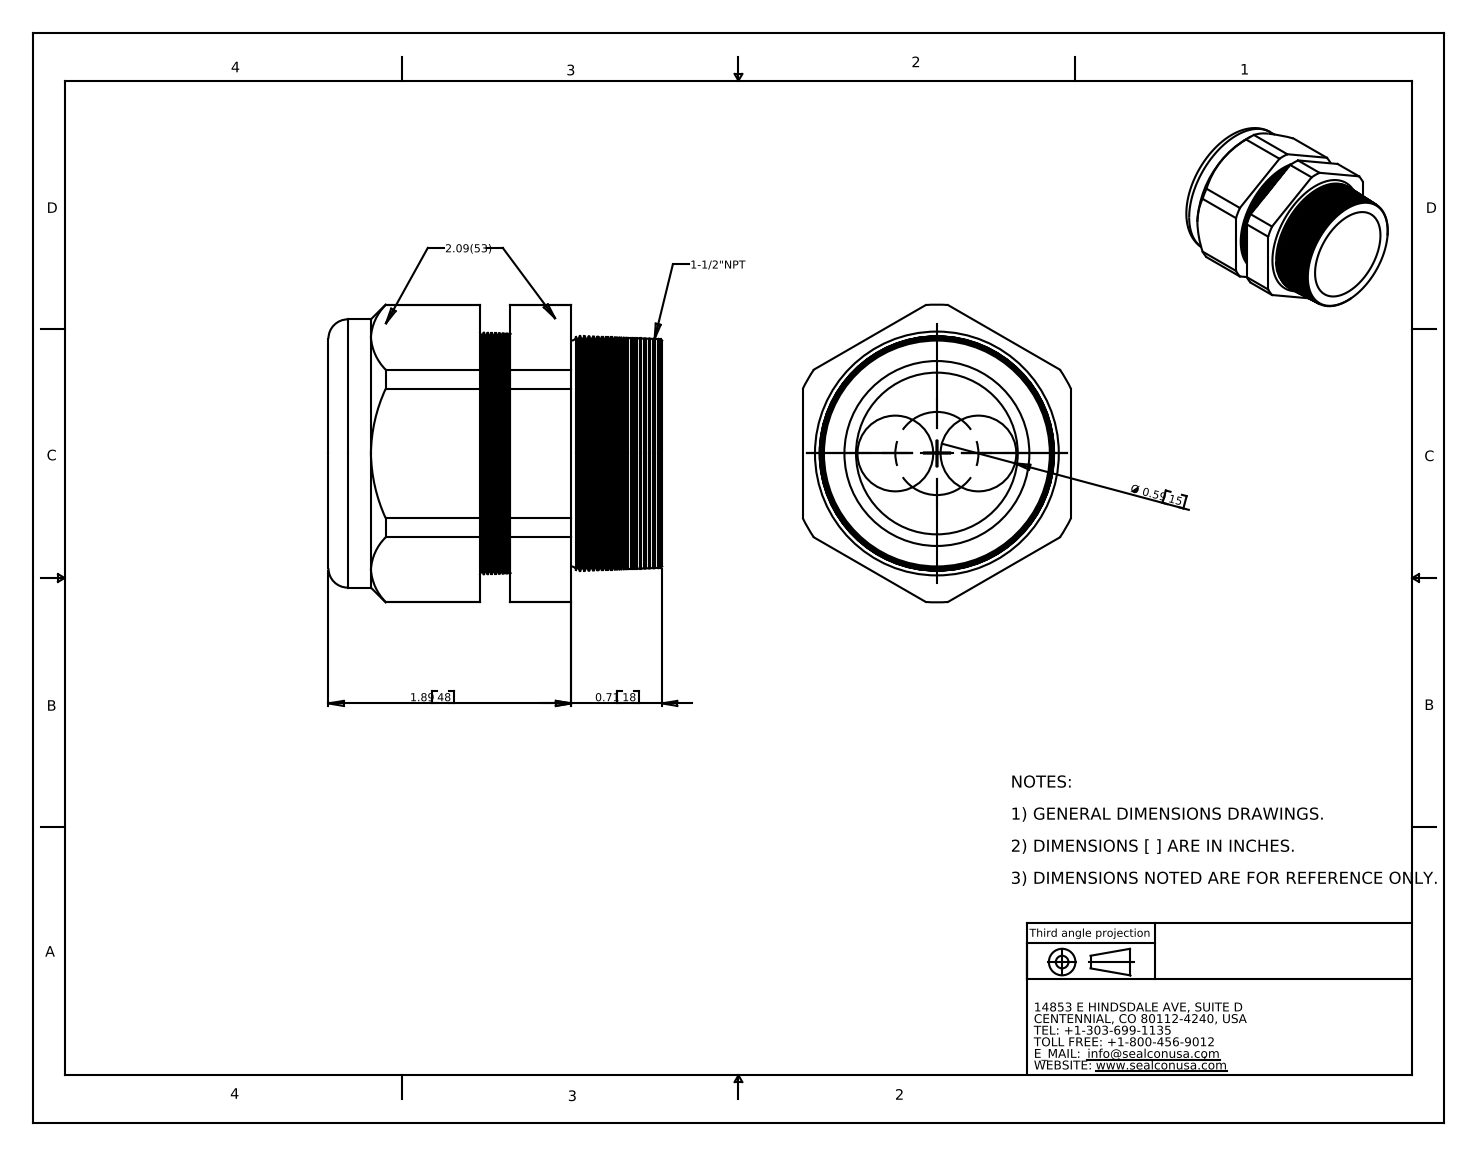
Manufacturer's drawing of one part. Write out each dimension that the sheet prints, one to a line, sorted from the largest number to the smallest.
1.89 48
0.71 18
Ø 0.59 15
